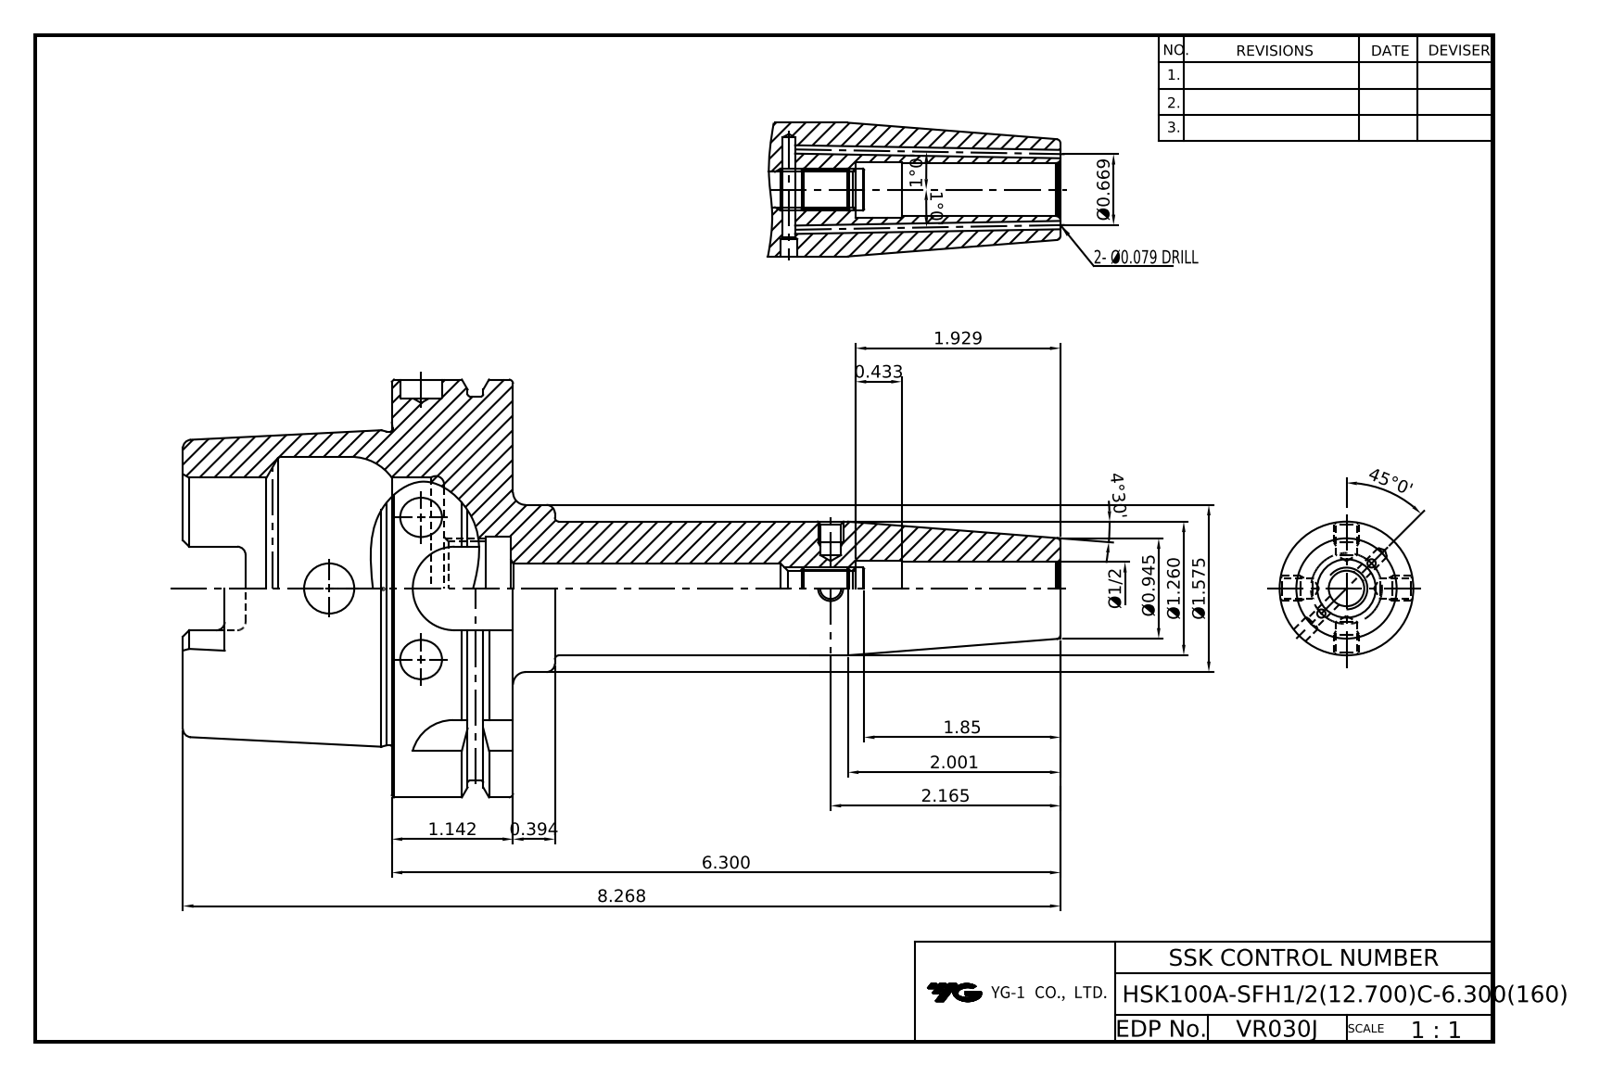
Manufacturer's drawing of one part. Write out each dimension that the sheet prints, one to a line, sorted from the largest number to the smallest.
45°0'
8.268
6.300
4°30'
2.165
2.001
1.929
1.85
Ø1.575
Ø1.260
1.142
1°0'
1°0'
Ø0.945
Ø0.669
0.433
0.394
